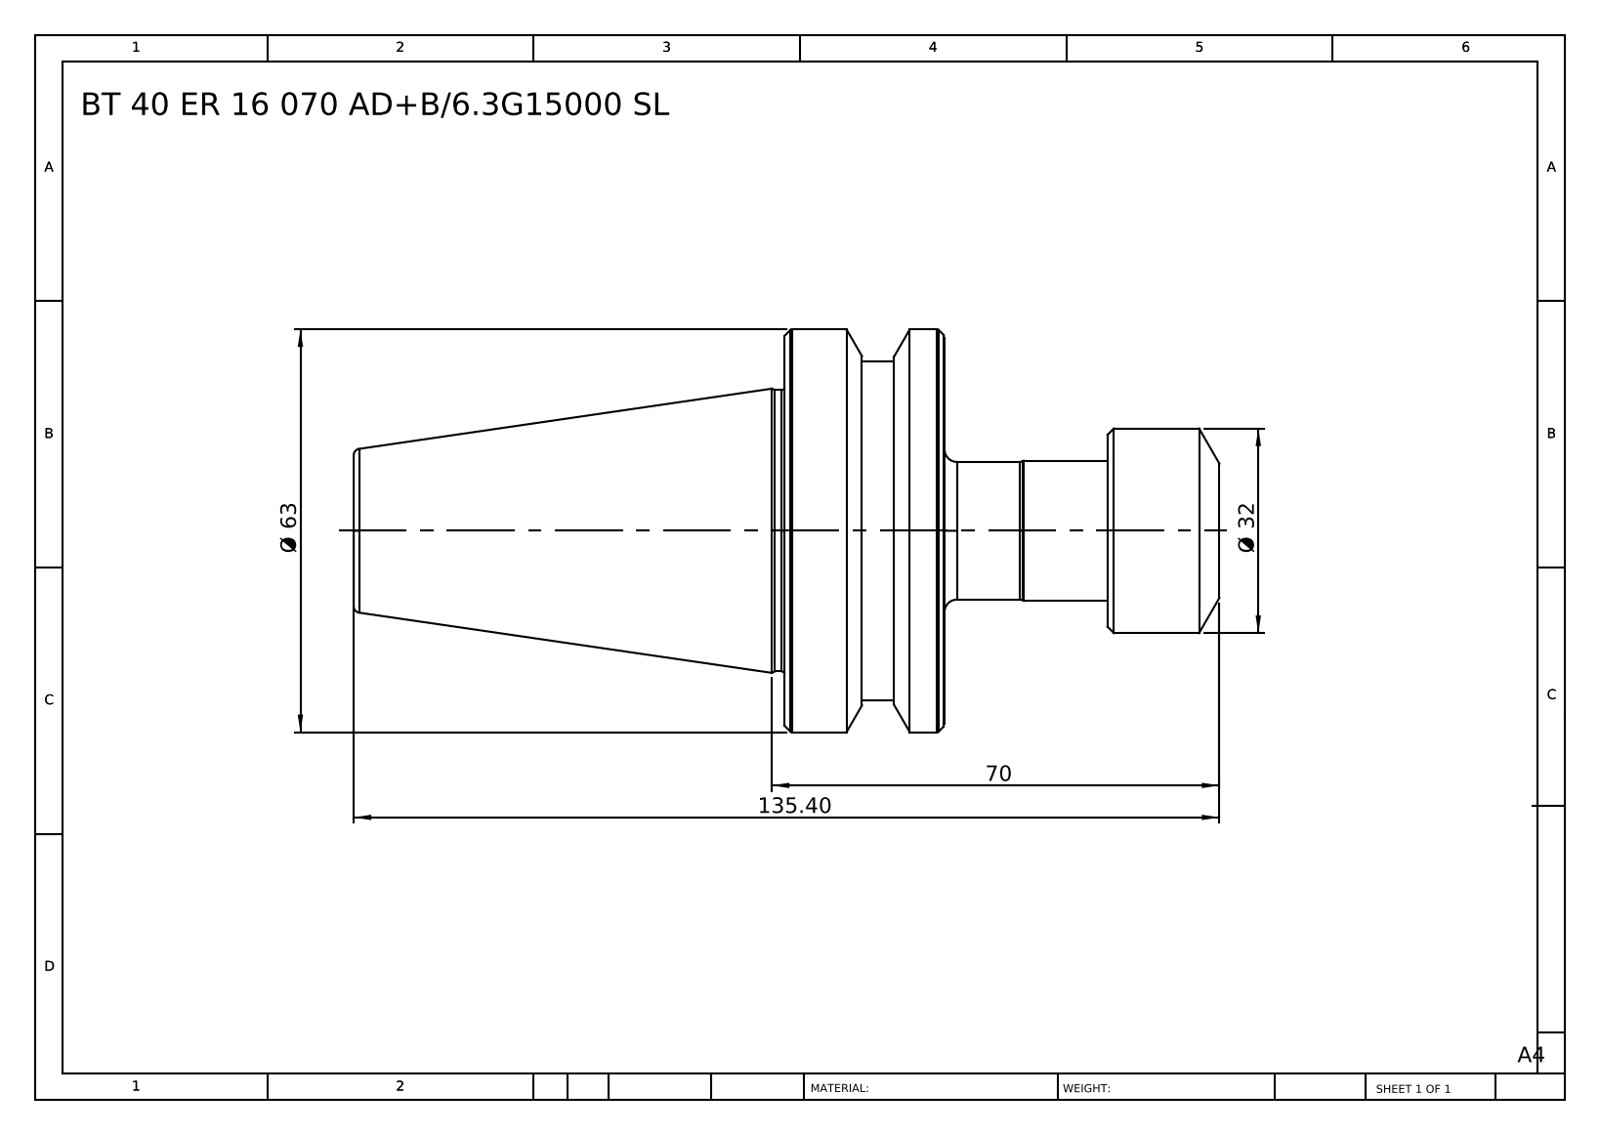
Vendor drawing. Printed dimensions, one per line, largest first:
135.40
70
Ø 63
Ø 32
